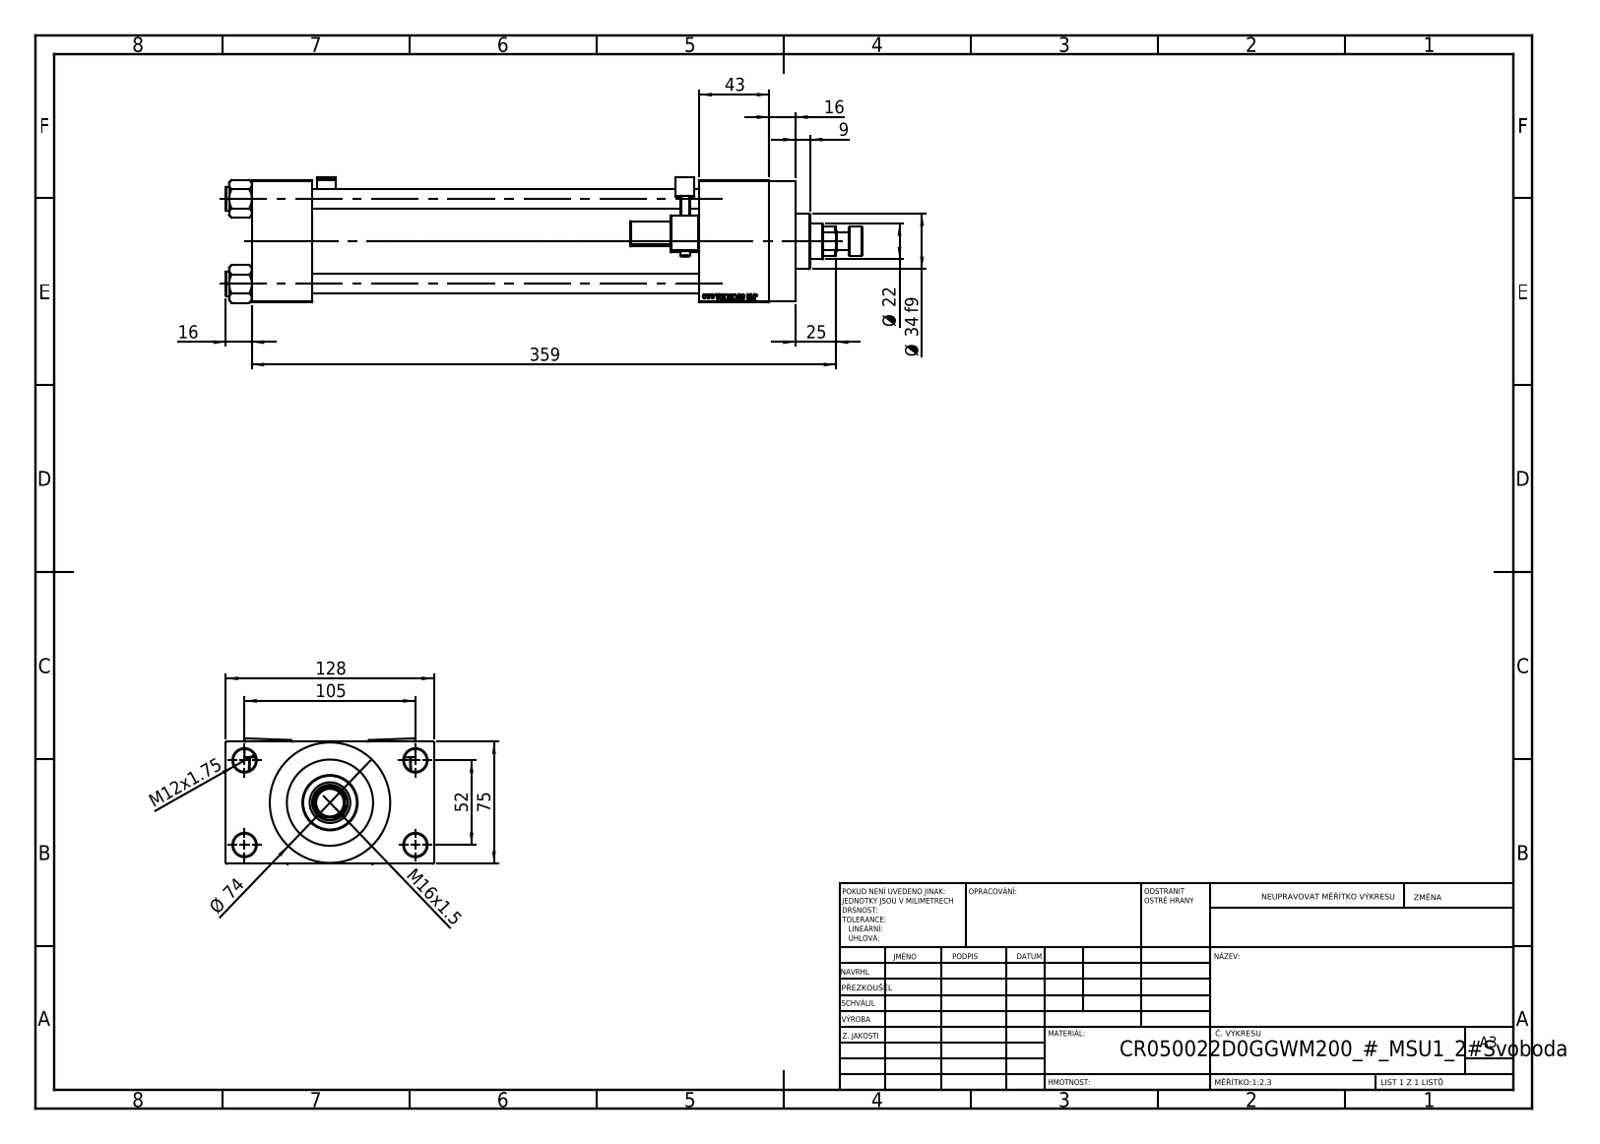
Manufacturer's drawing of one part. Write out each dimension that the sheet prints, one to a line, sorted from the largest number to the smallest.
359
128
105
75
Ø 74
52
43
Ø 34 f9
25
Ø 22
16
16
M16x1.5
M12x1.75
9
